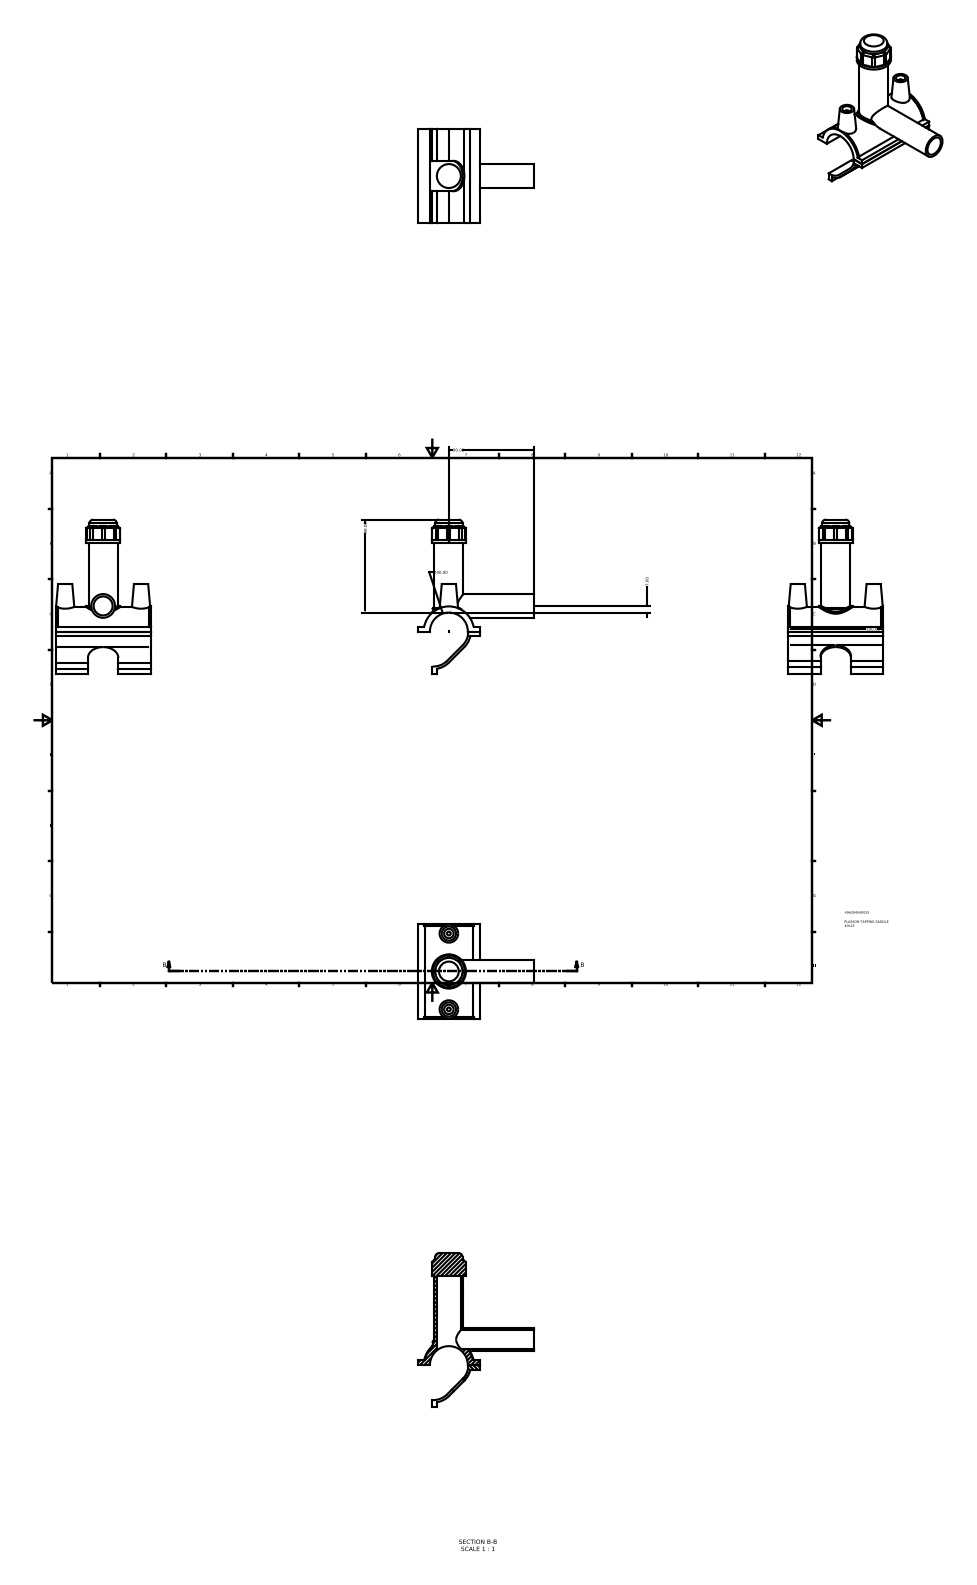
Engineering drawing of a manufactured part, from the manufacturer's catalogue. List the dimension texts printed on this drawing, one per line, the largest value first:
100.00
98.00
90.00
∅40.00
7.00
